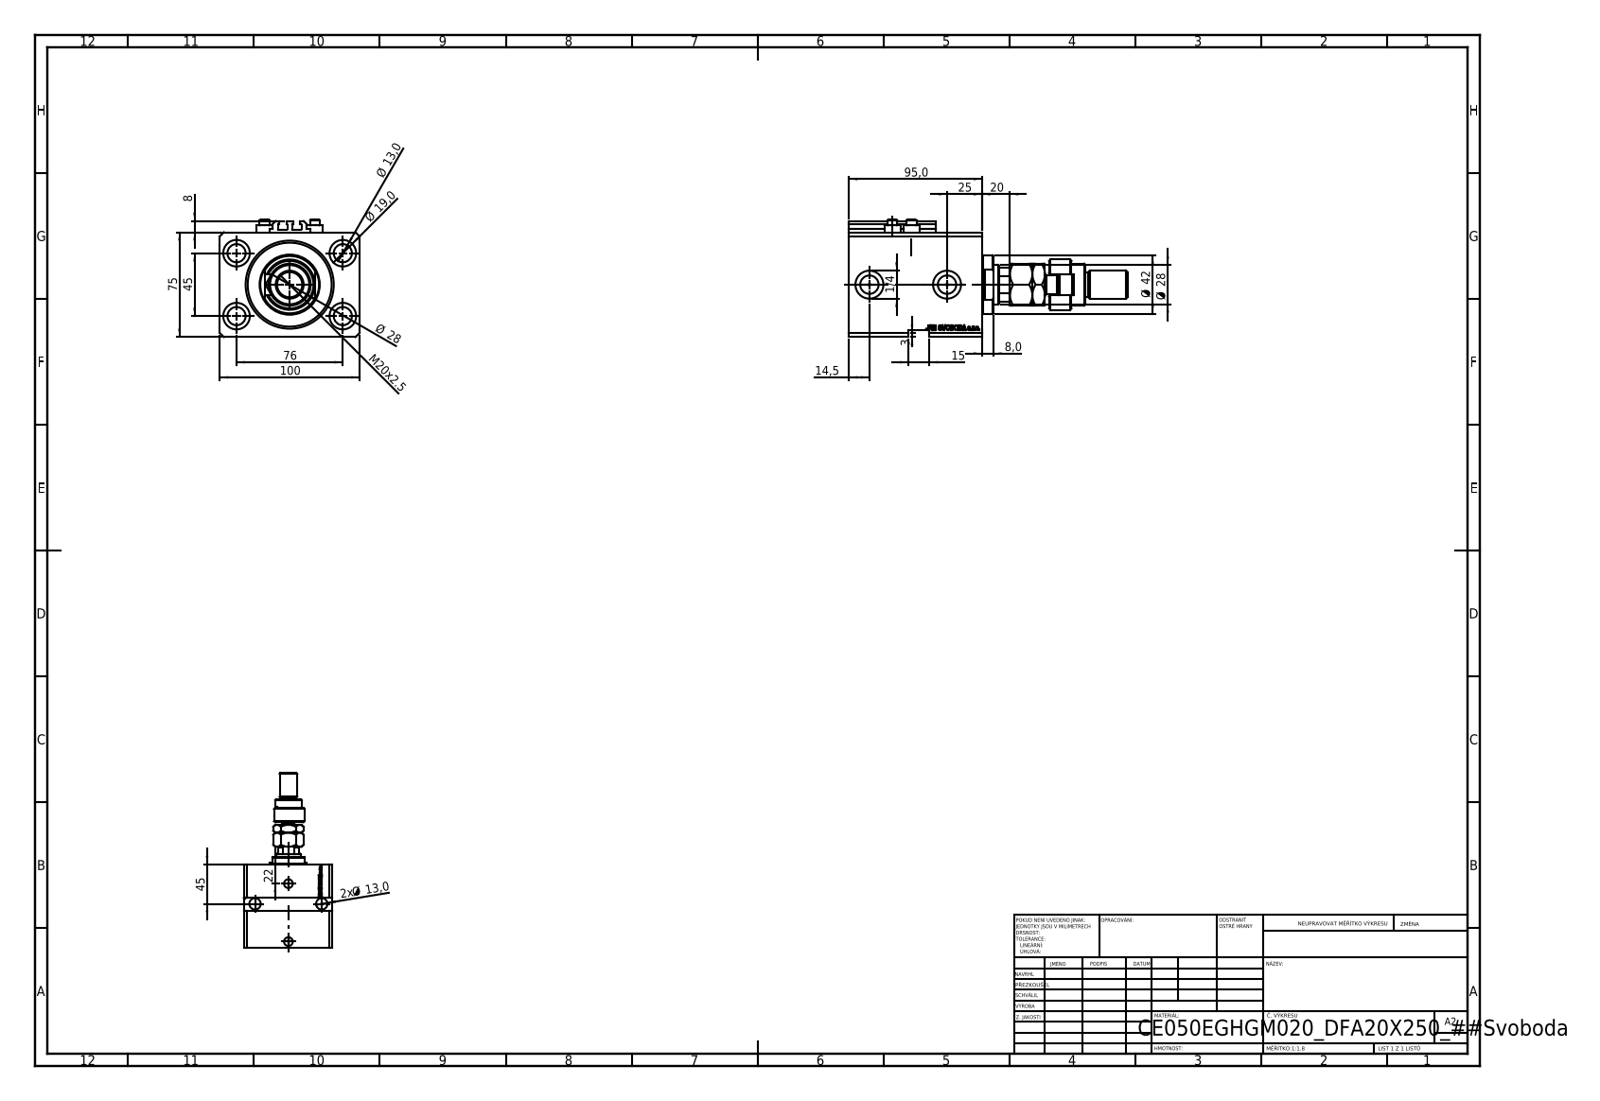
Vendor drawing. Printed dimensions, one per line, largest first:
100
95,0
76
75
45
45
Ø 42
Ø 28
Ø 28
25
22
M20x2.5
20
Ø 19,0
15
14,5
Ø 13,0
2x Ø 13,0
8
8,0
3
1/4
